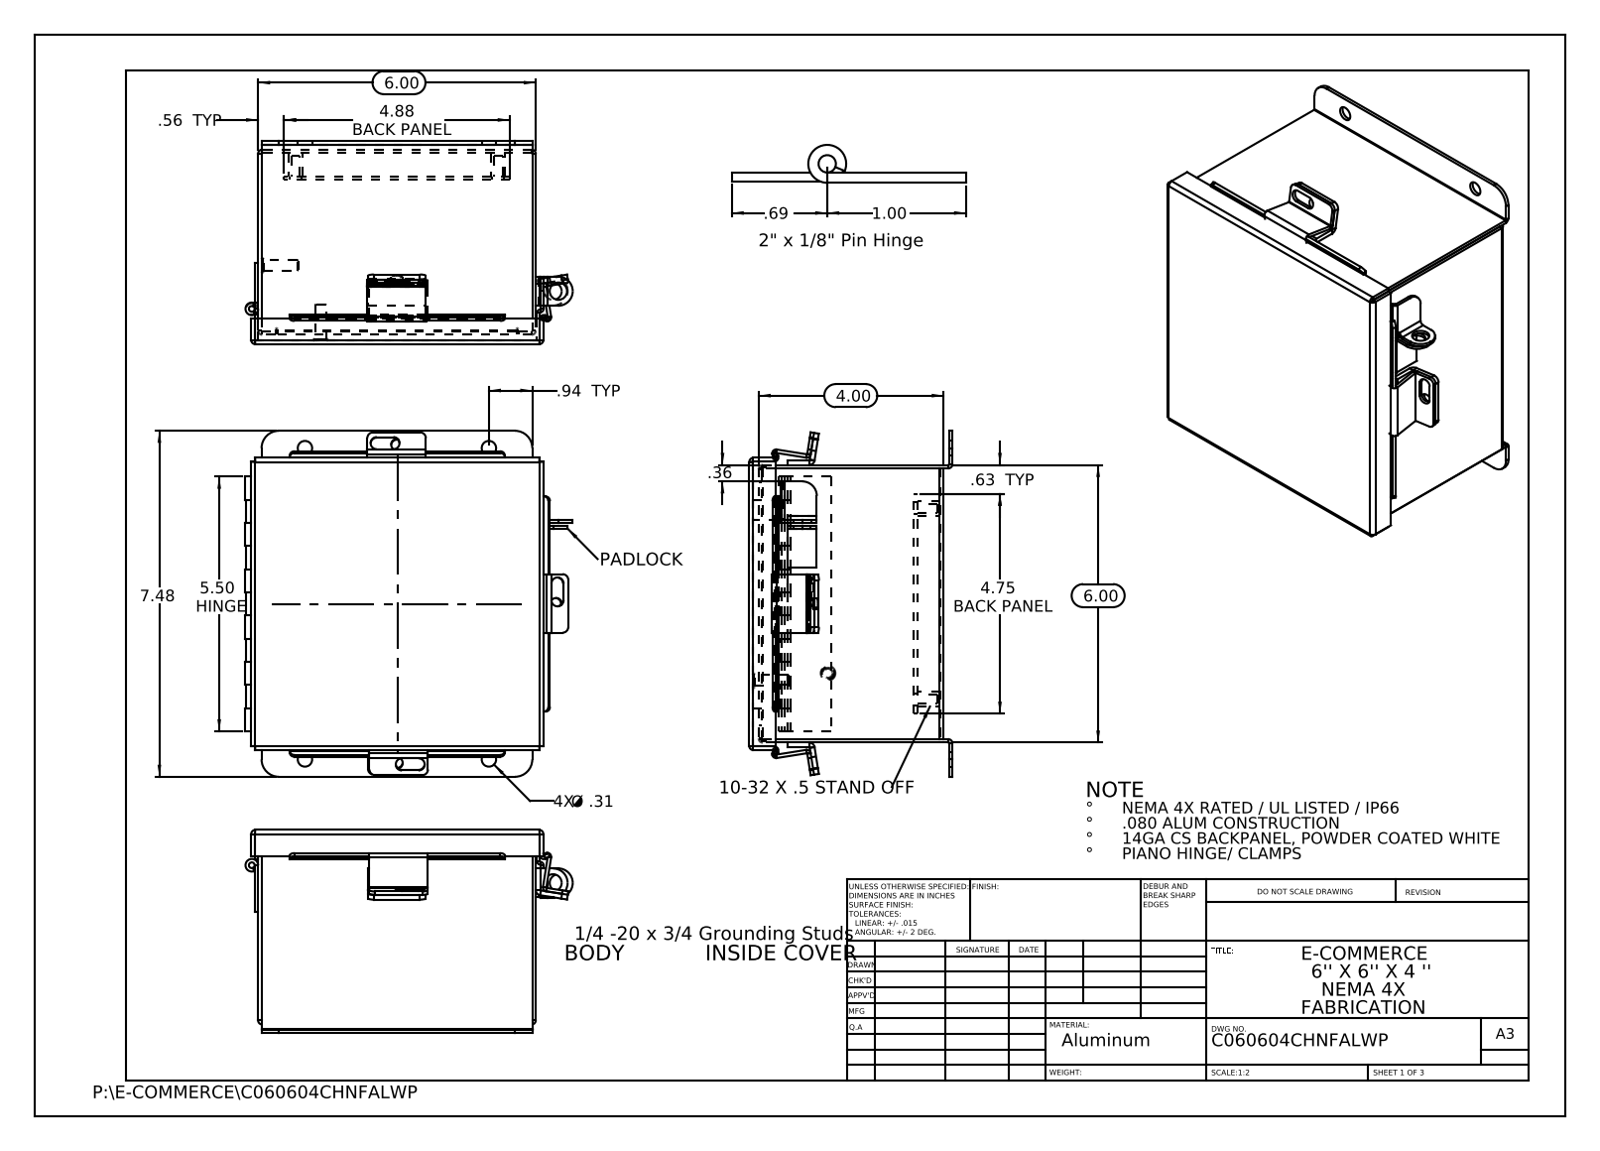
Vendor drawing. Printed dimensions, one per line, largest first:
7.48
6.00
6.00
5.50 HINGE
4.88 BACK PANEL
4.75 BACK PANEL
4.00
1.00
.94 TYP
.69
.63 TYP
.56 TYP
.36
4X Ø .31
